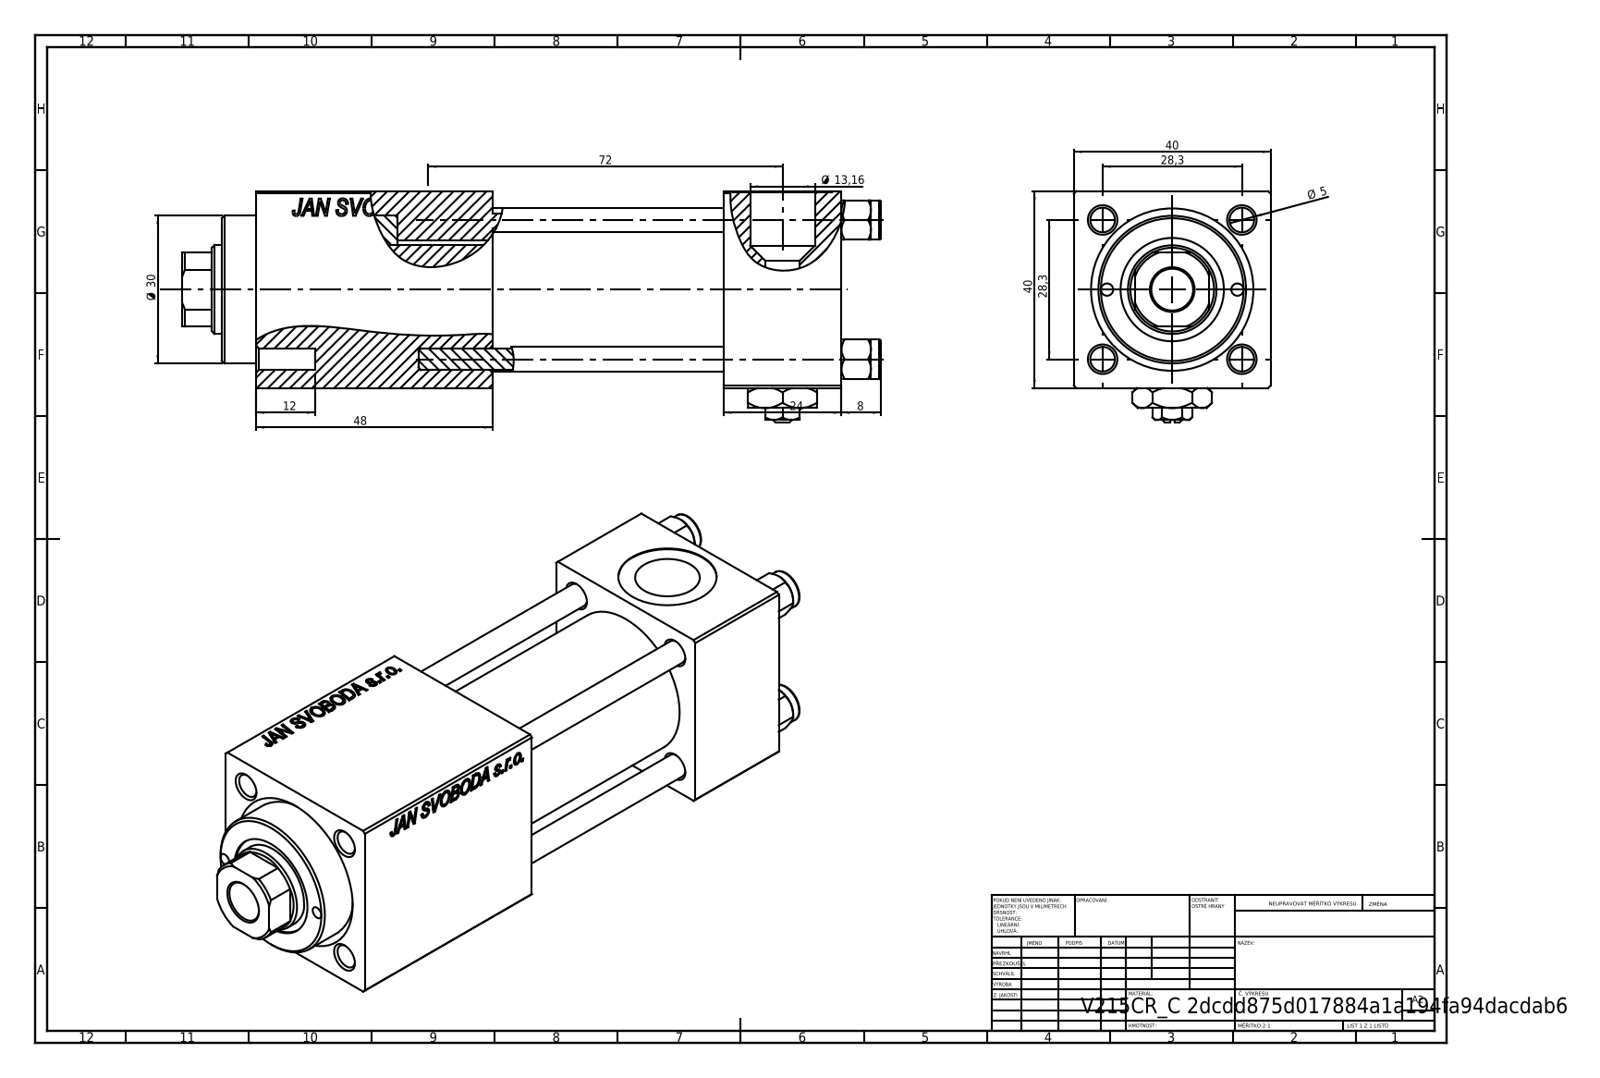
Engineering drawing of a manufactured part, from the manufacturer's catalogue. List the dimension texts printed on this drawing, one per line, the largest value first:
72
48
40
40
Ø 30
28,3
28,3
24
Ø 13,16
12
8
Ø 5
